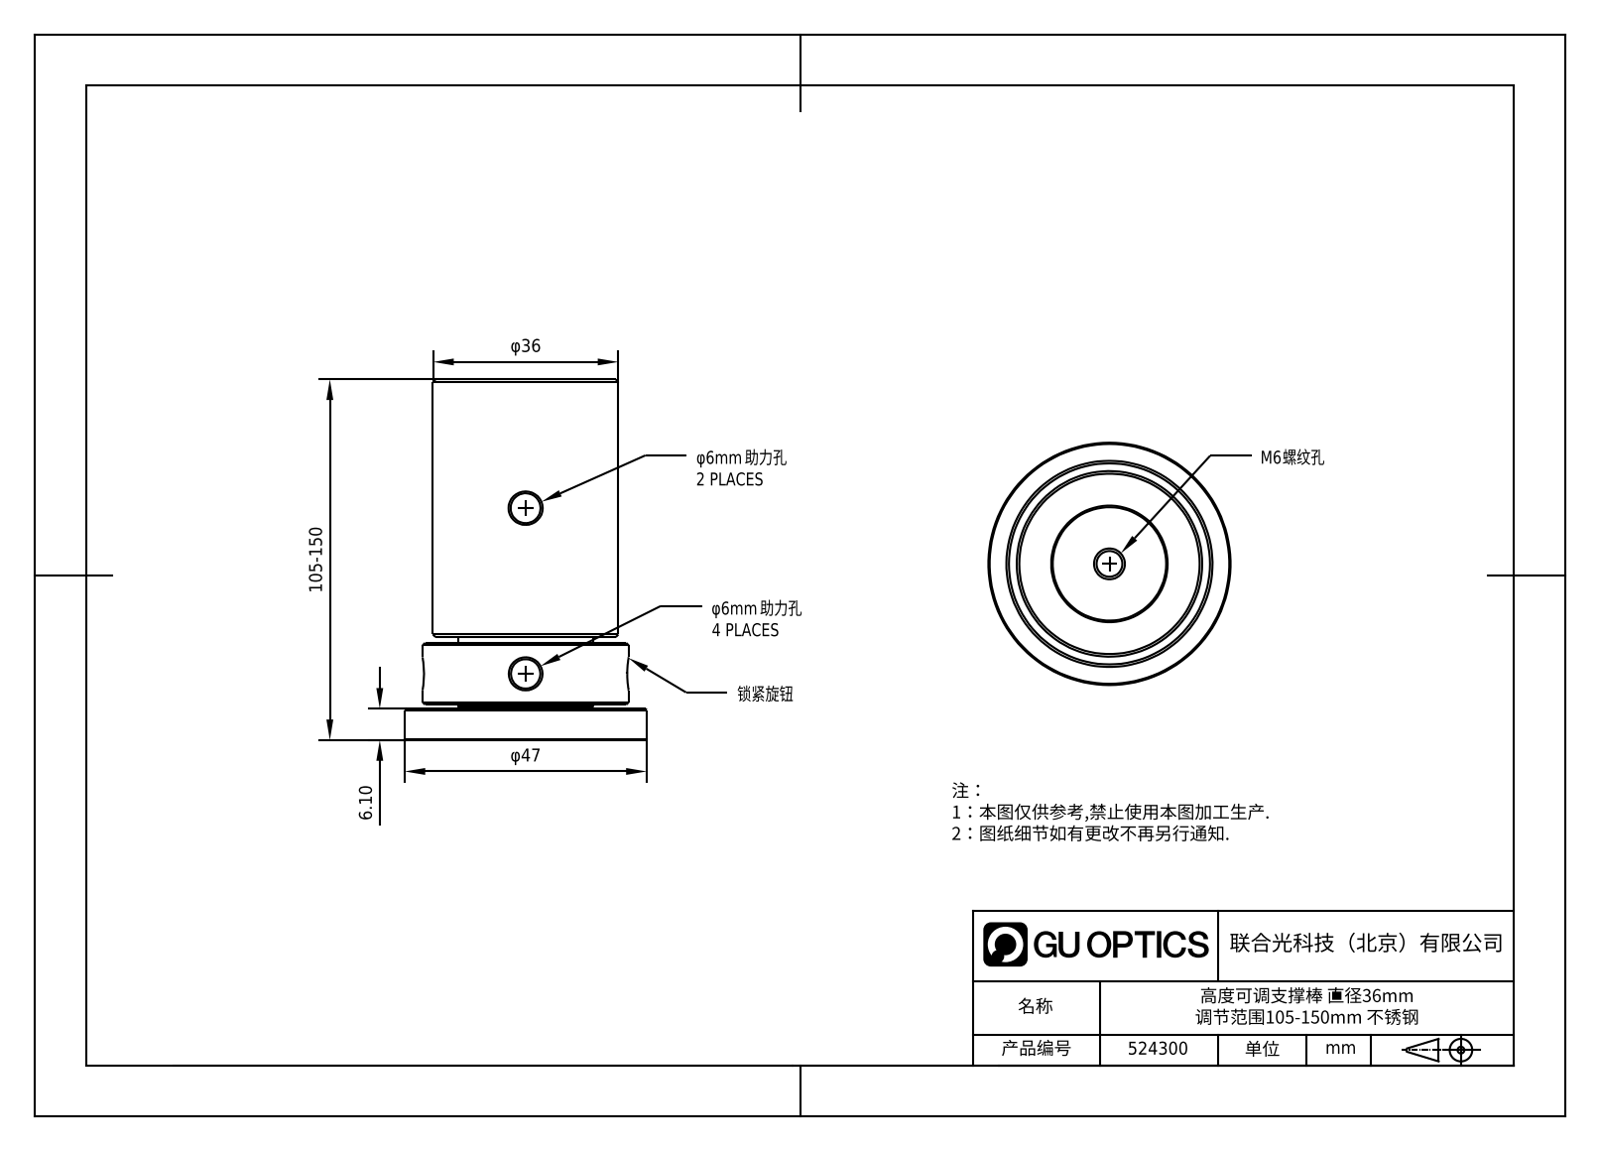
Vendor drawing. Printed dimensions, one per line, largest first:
105-150
φ47
φ36
6.10
